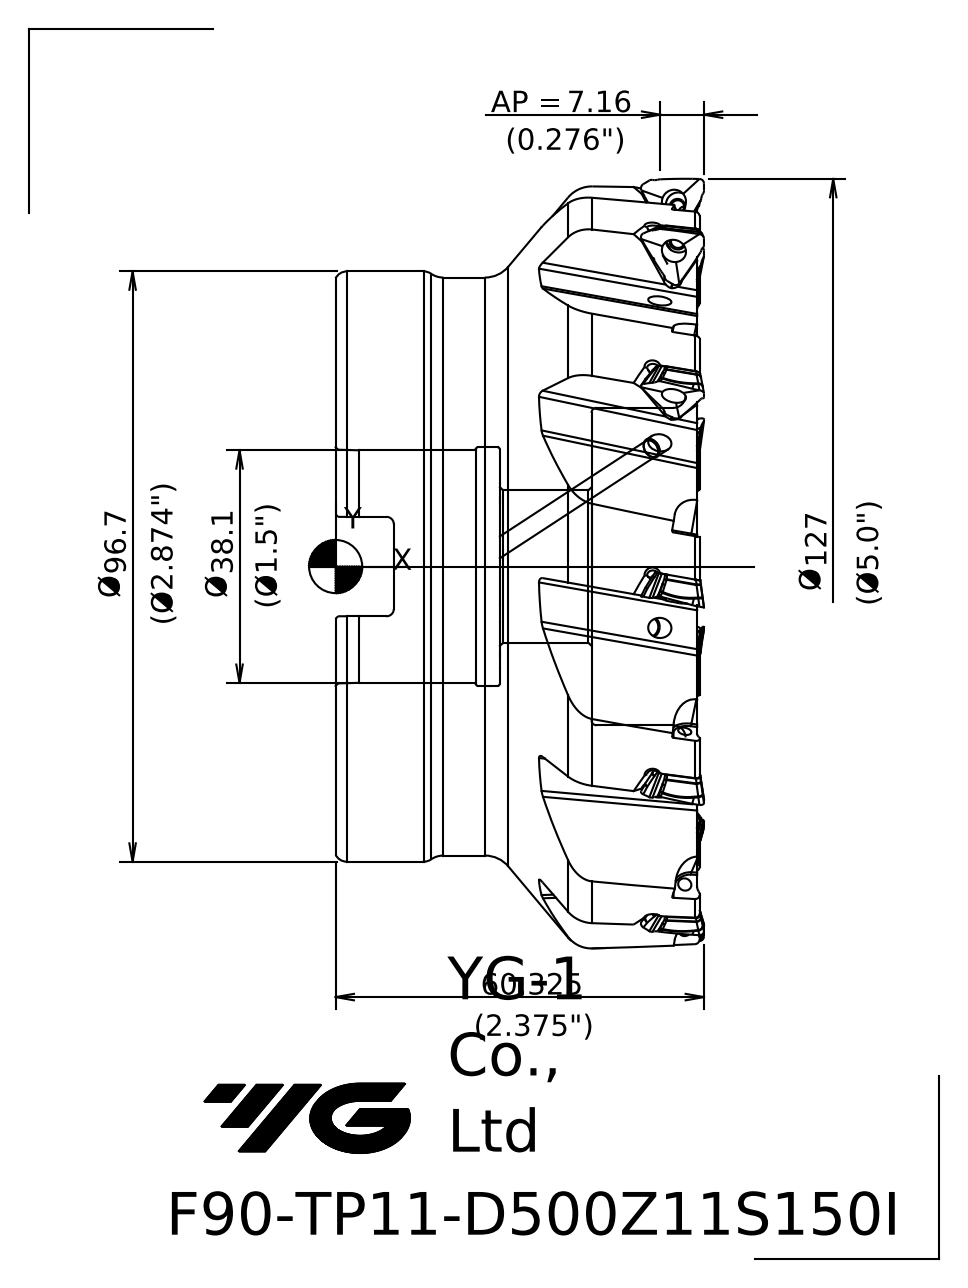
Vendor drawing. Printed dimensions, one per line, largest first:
127 Ø
60.325
38.1 Ø
AP = 7.16
